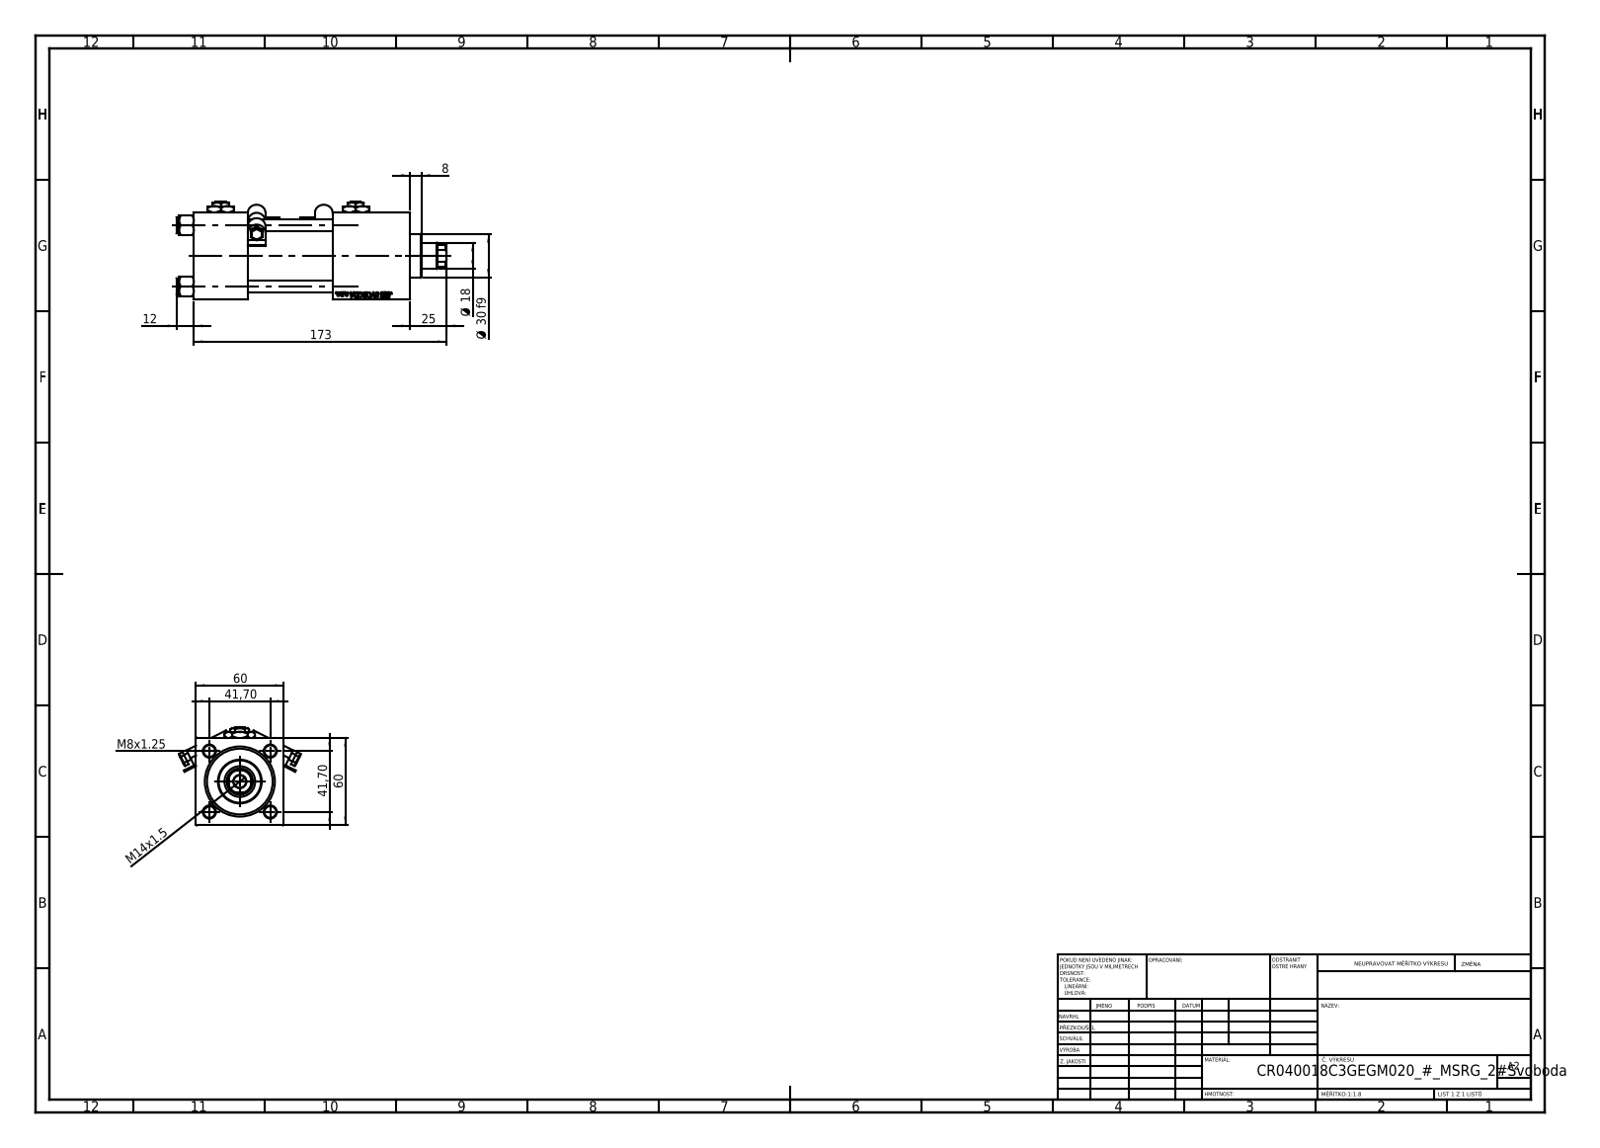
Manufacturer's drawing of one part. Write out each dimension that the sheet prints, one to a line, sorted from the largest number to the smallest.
173
60
60
41,70
41,70
Ø 30 f9
25
Ø 18
M14x1.5
12
8
M8x1.25
